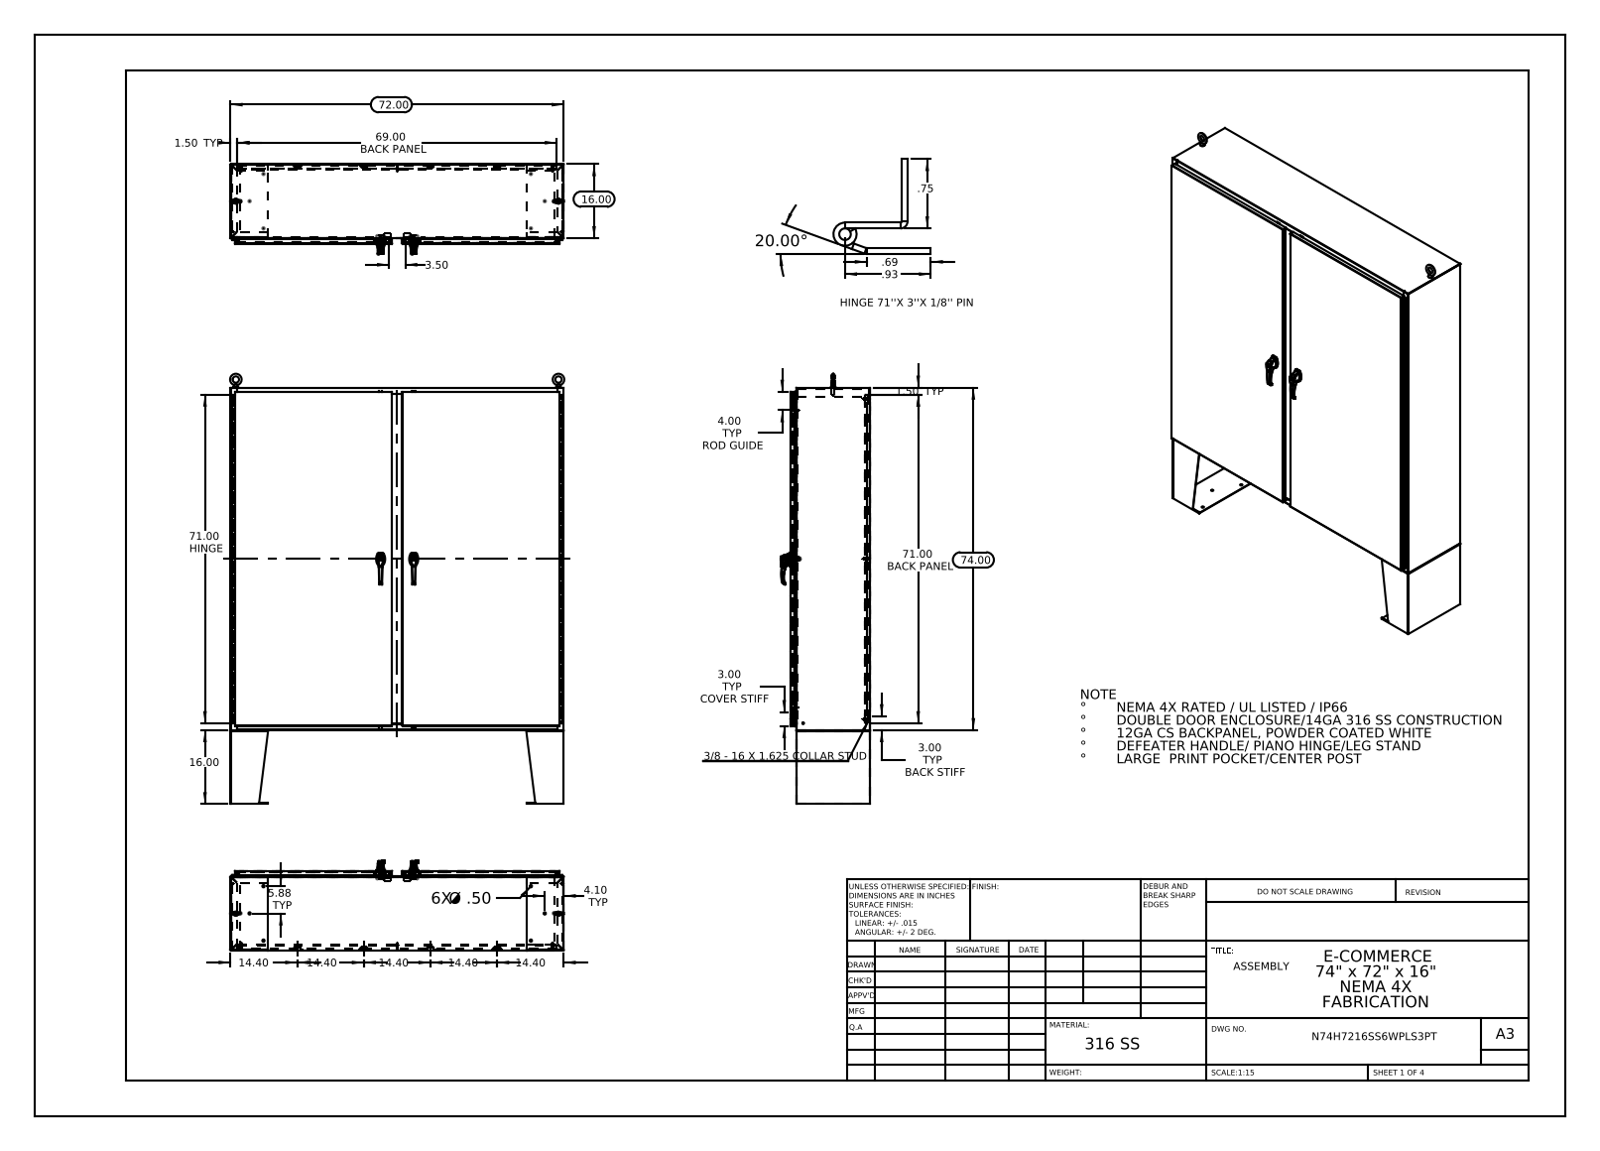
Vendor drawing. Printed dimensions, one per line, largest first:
74.00
72.00
71.00 HINGE
71.00 BACK PANEL
69.00 BACK PANEL
20.00°
16.00
16.00
14.40
14.40
14.40
14.40
14.40
5.88 TYP
4.10 TYP
4.00 TYP ROD GUIDE
3.50
3.00 TYP BACK STIFF
3.00 TYP COVER STIFF
1.50 TYP
1.50 TYP
.93
.75
.69
6X Ø .50
